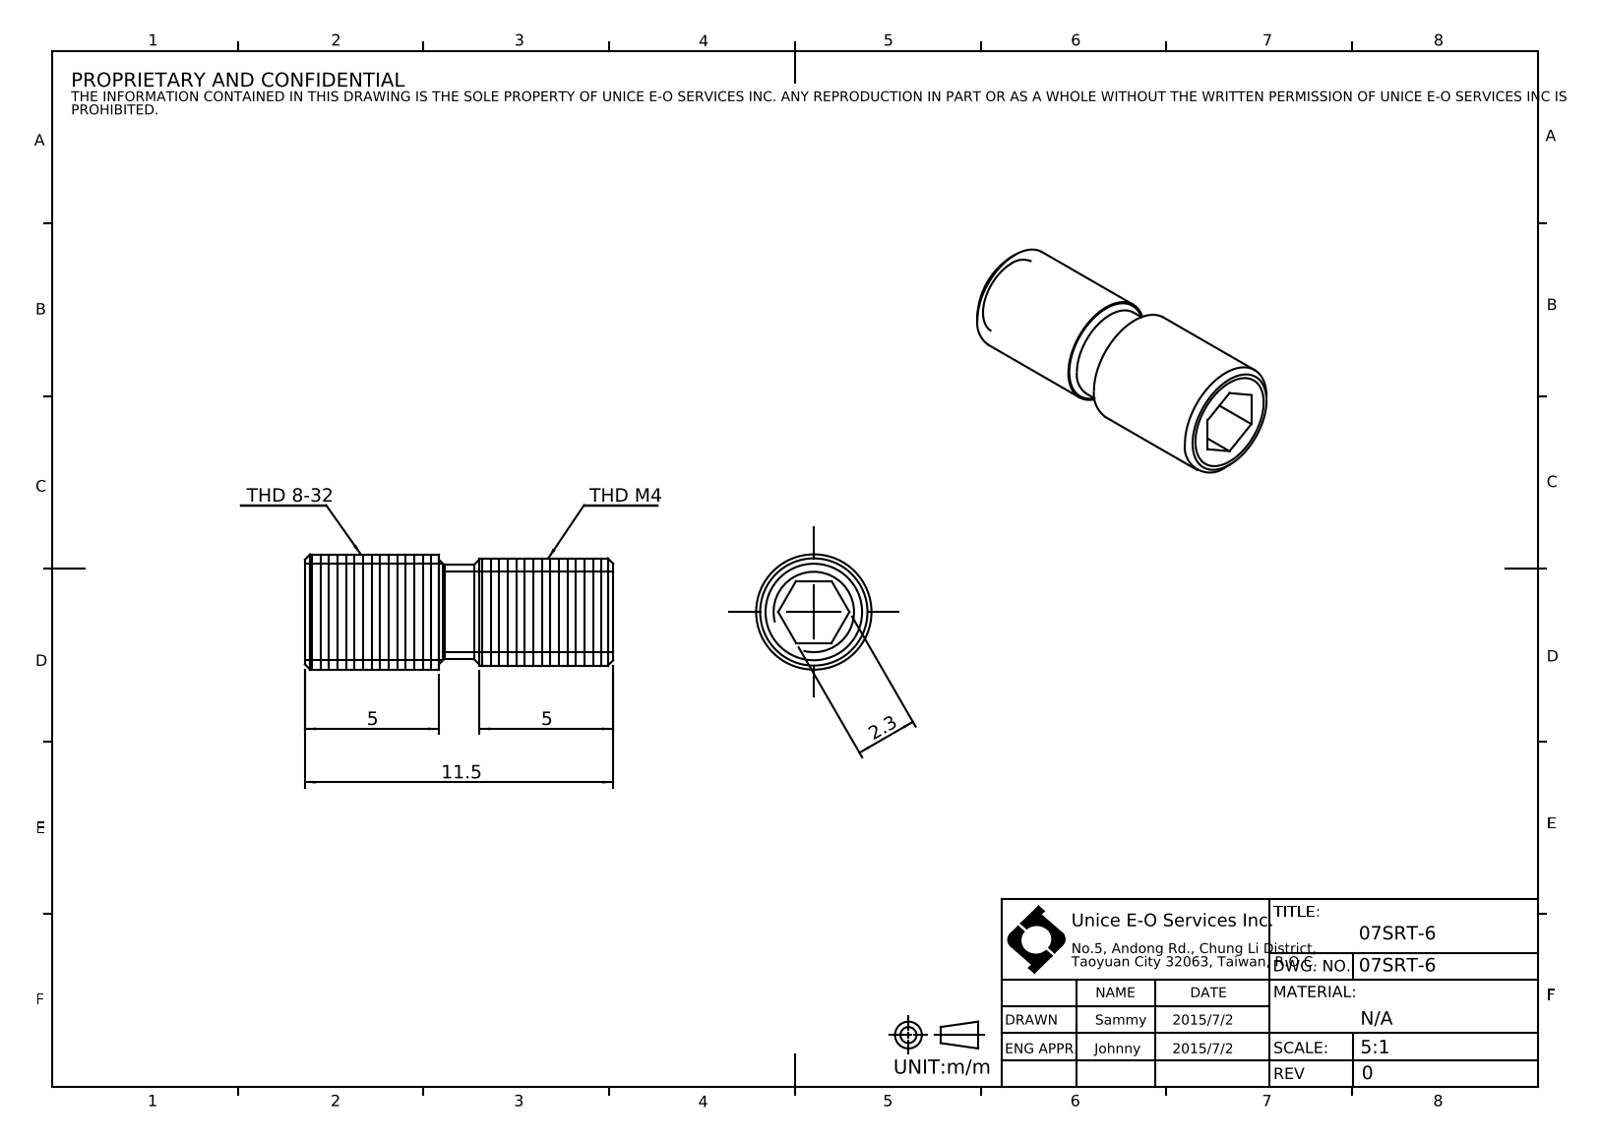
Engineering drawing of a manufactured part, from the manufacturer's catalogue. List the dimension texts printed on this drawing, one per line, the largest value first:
11.5
5
5
2.3
